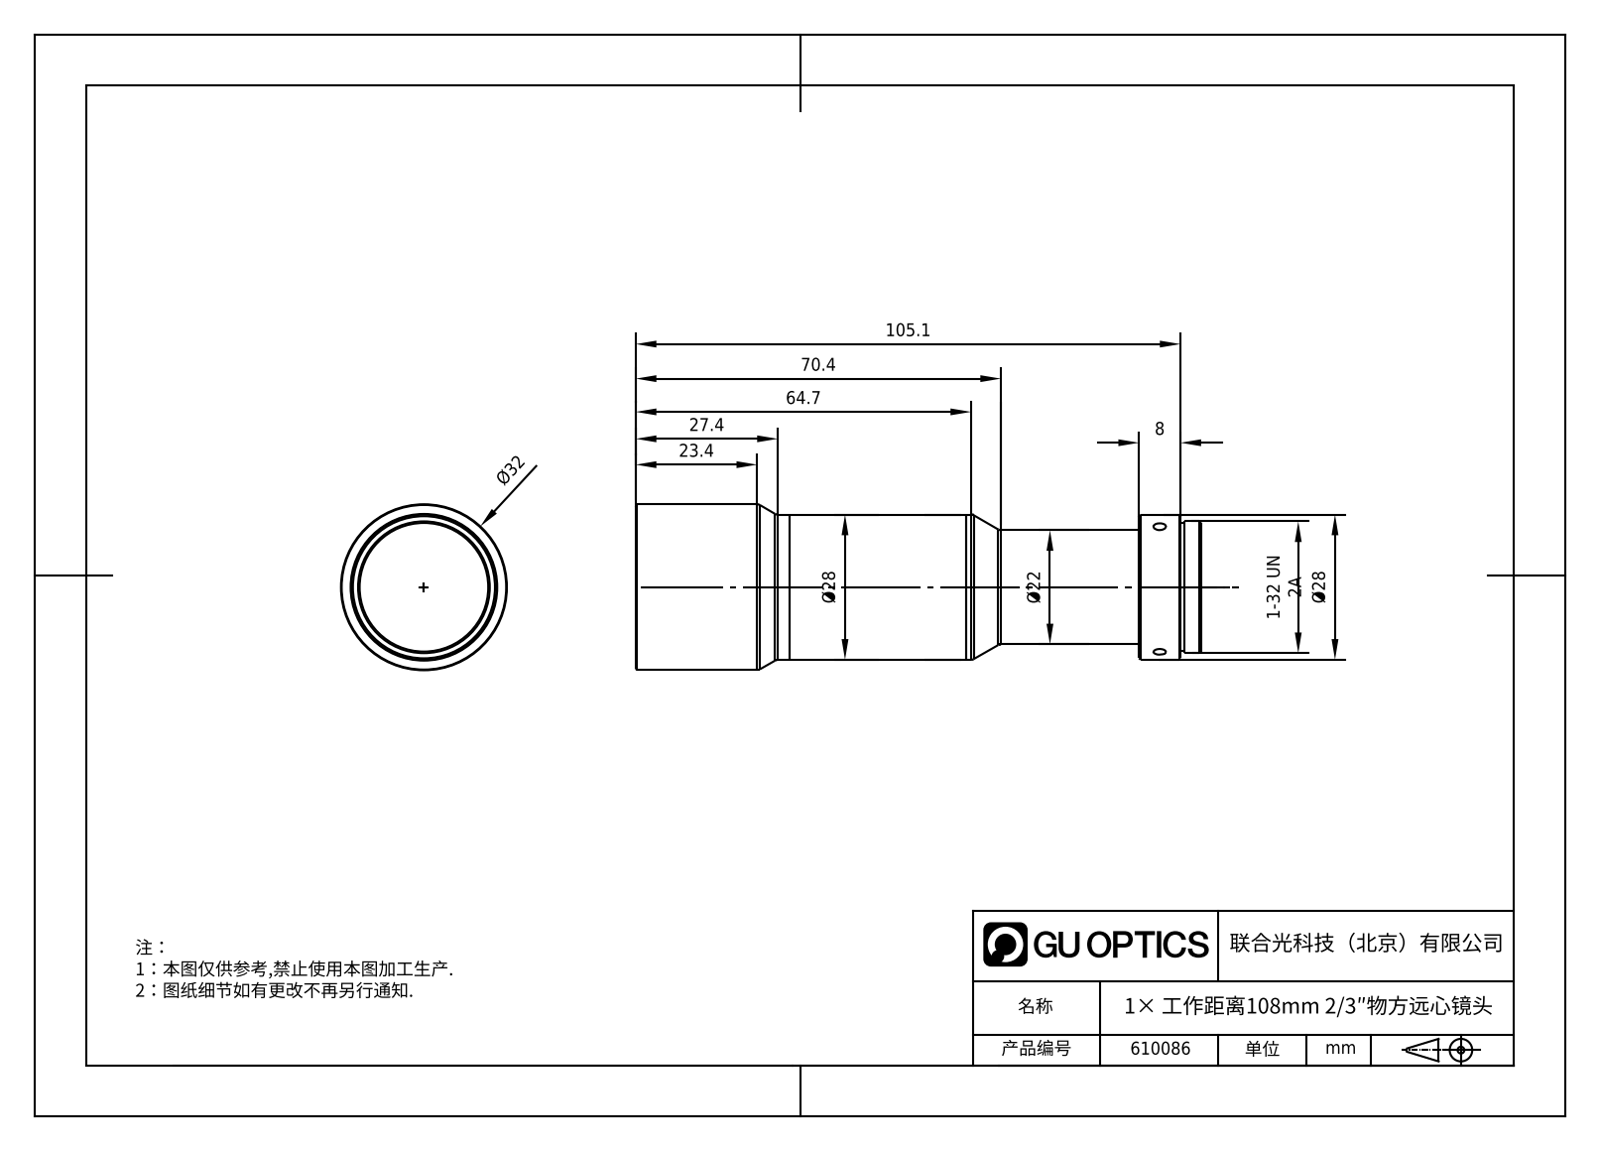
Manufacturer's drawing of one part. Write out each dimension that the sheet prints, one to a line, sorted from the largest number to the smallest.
105.1
70.4
64.7
Ø32
Ø28
Ø28
27.4
23.4
Ø22
8
1-32 UN 2A
